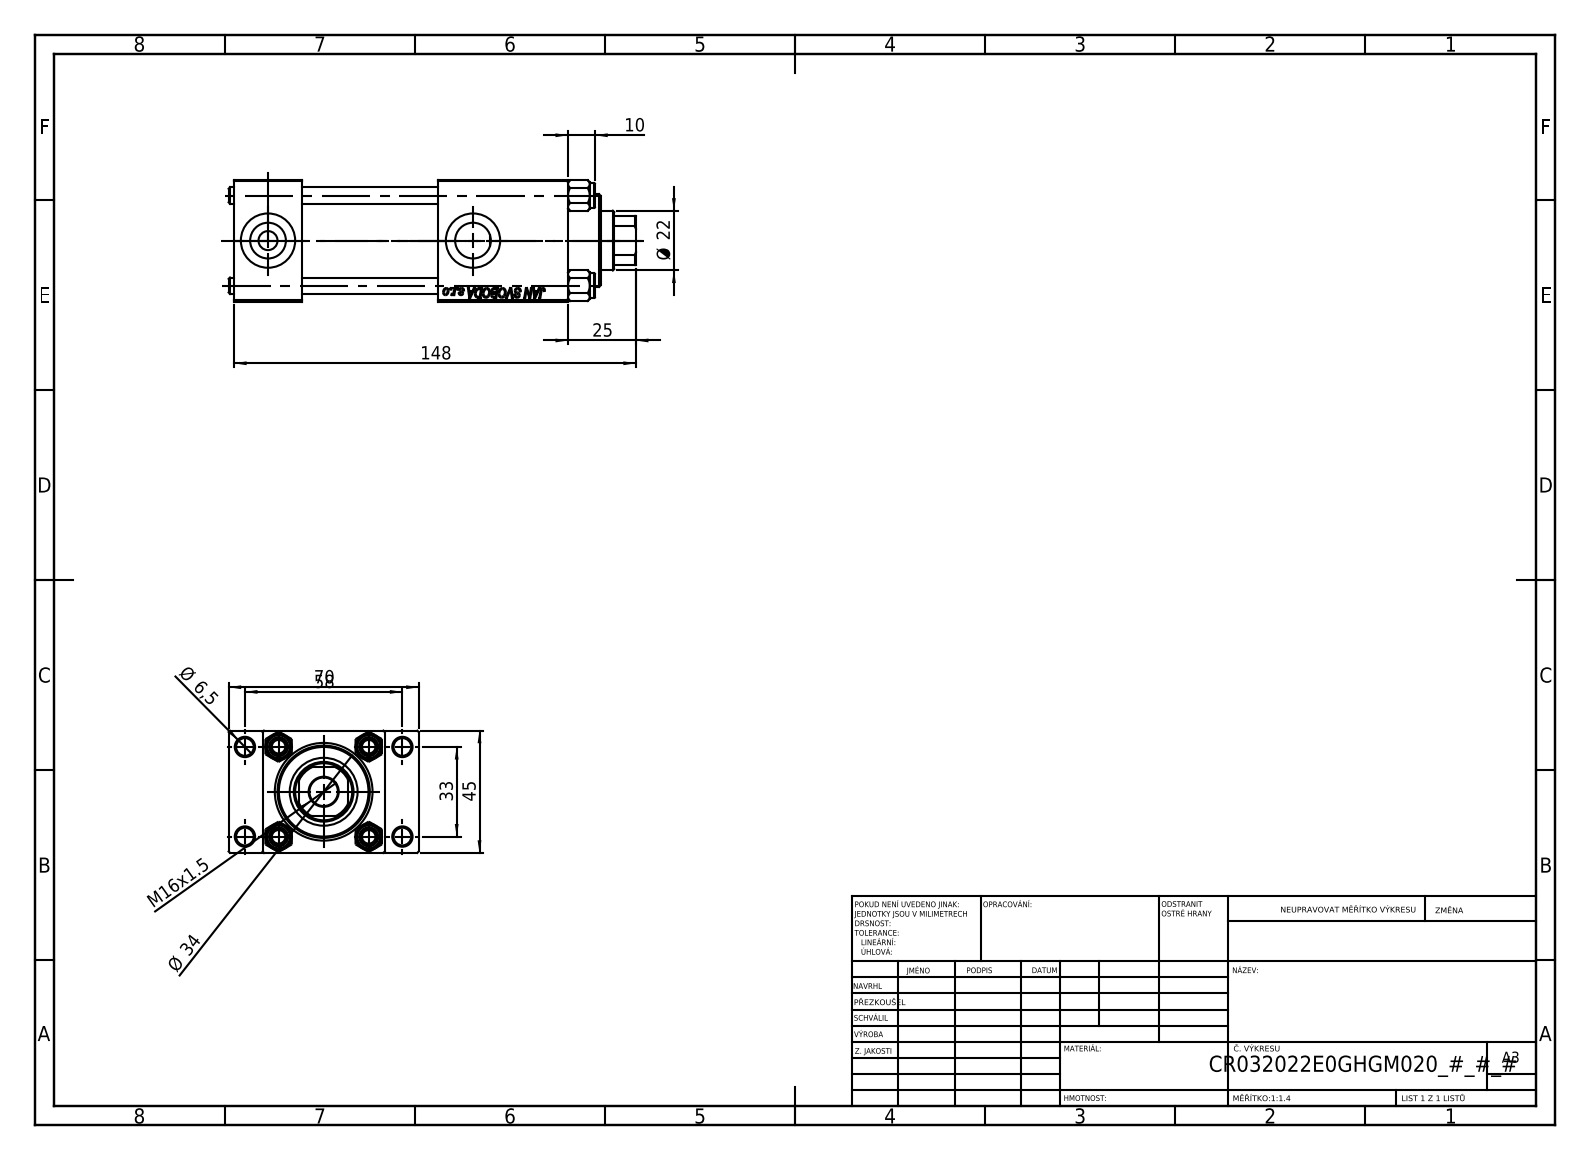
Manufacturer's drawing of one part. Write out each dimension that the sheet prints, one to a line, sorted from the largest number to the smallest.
148
70
58
45
Ø 34
33
25
Ø 22
M16x1.5
10
Ø 6,5
